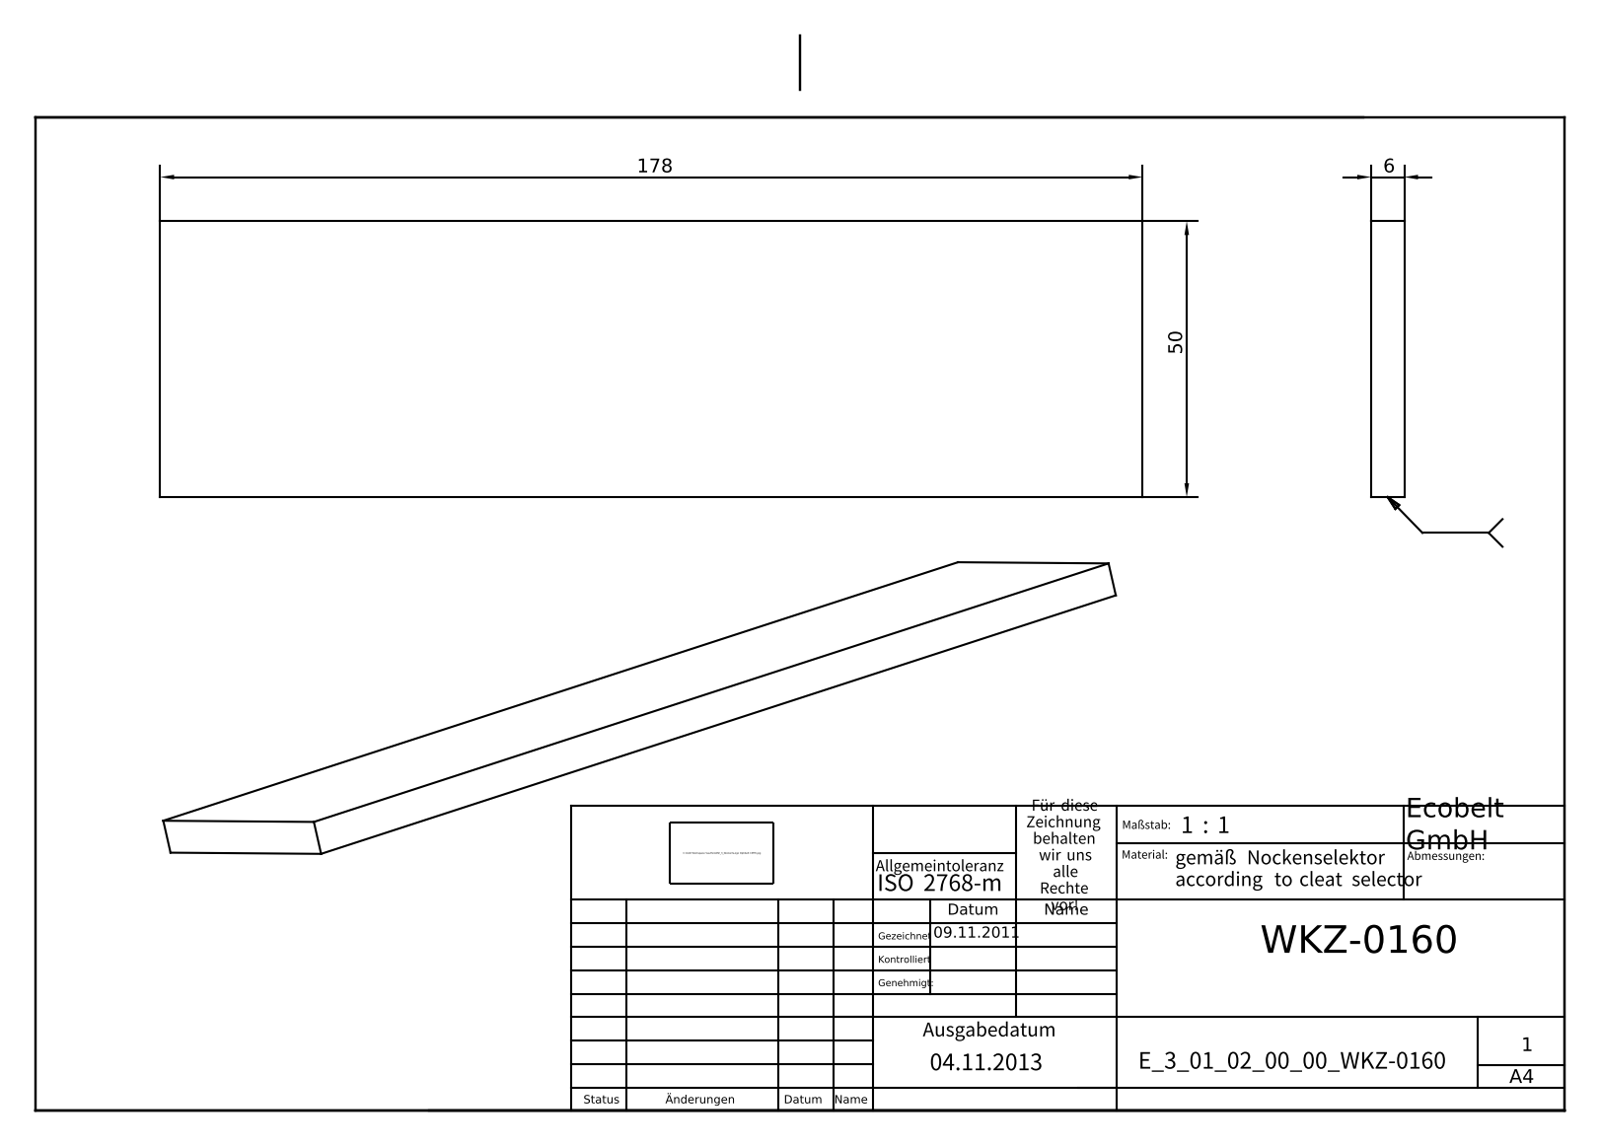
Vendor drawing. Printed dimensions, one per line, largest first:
178
50
6
